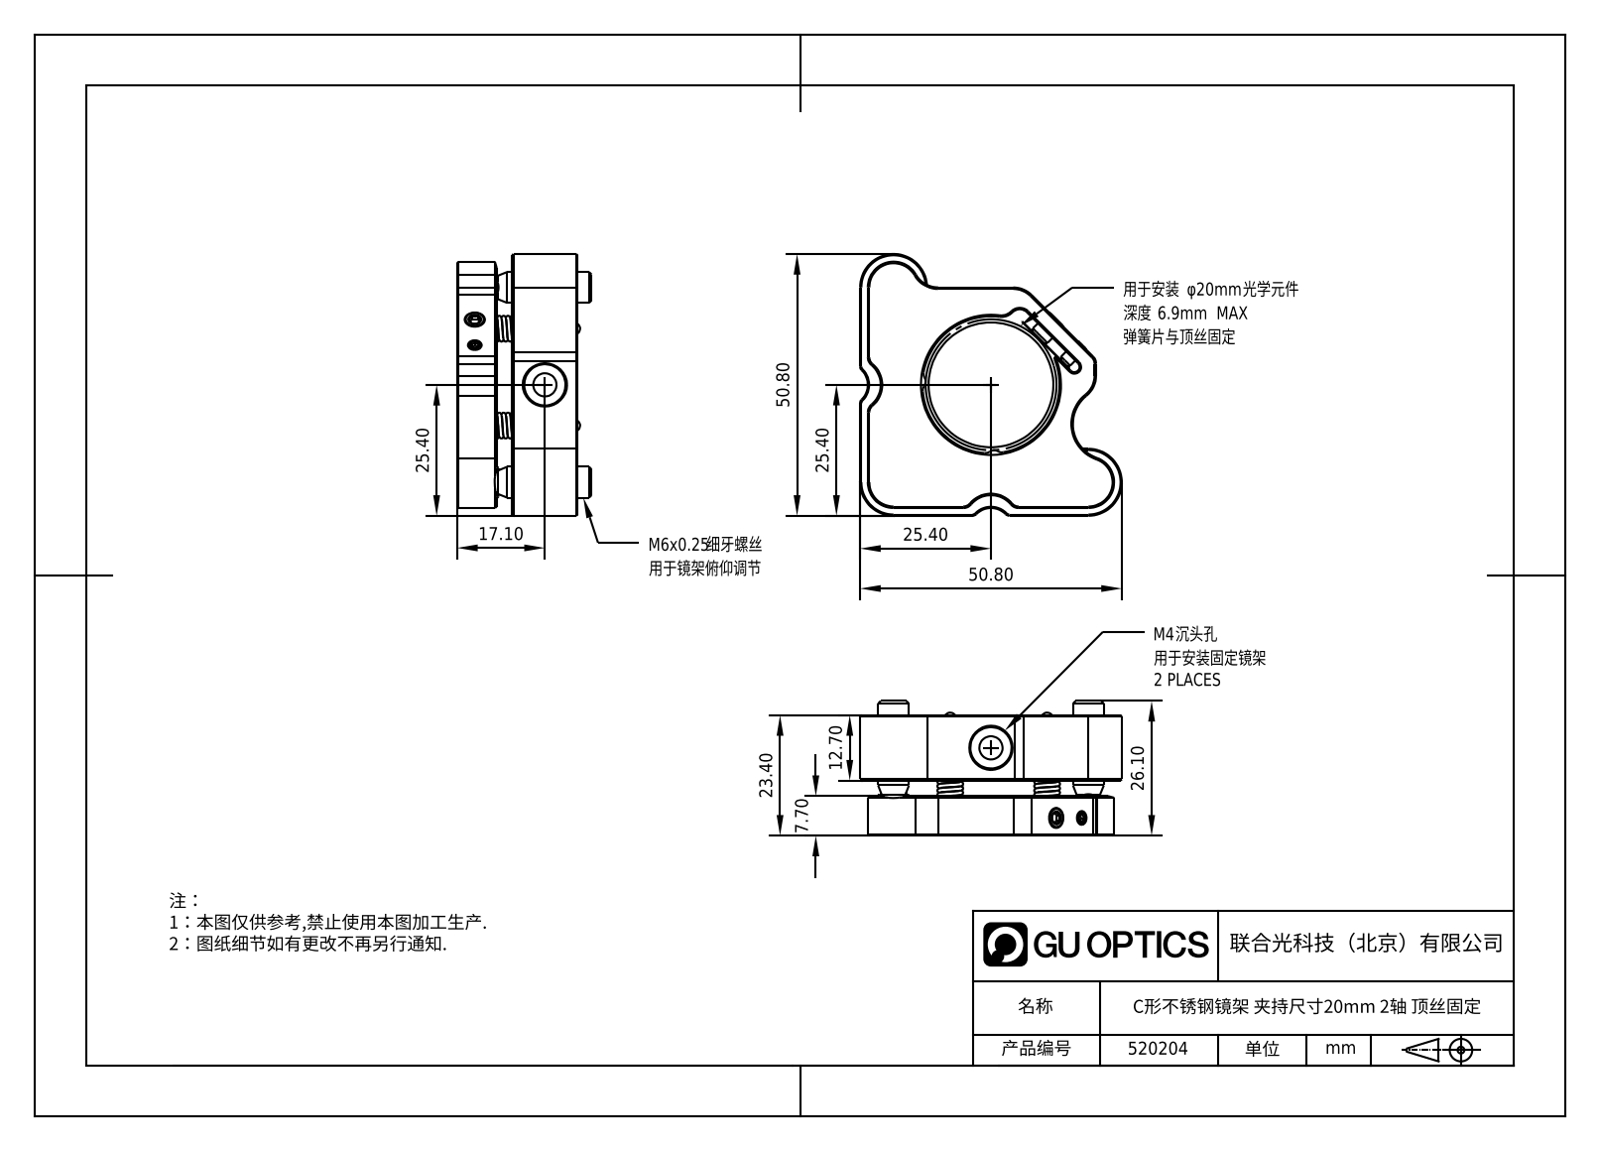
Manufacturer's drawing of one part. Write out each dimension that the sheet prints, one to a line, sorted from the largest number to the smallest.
50.80
50.80
26.10
25.40
25.40
25.40
23.40
17.10
12.70
7.70
